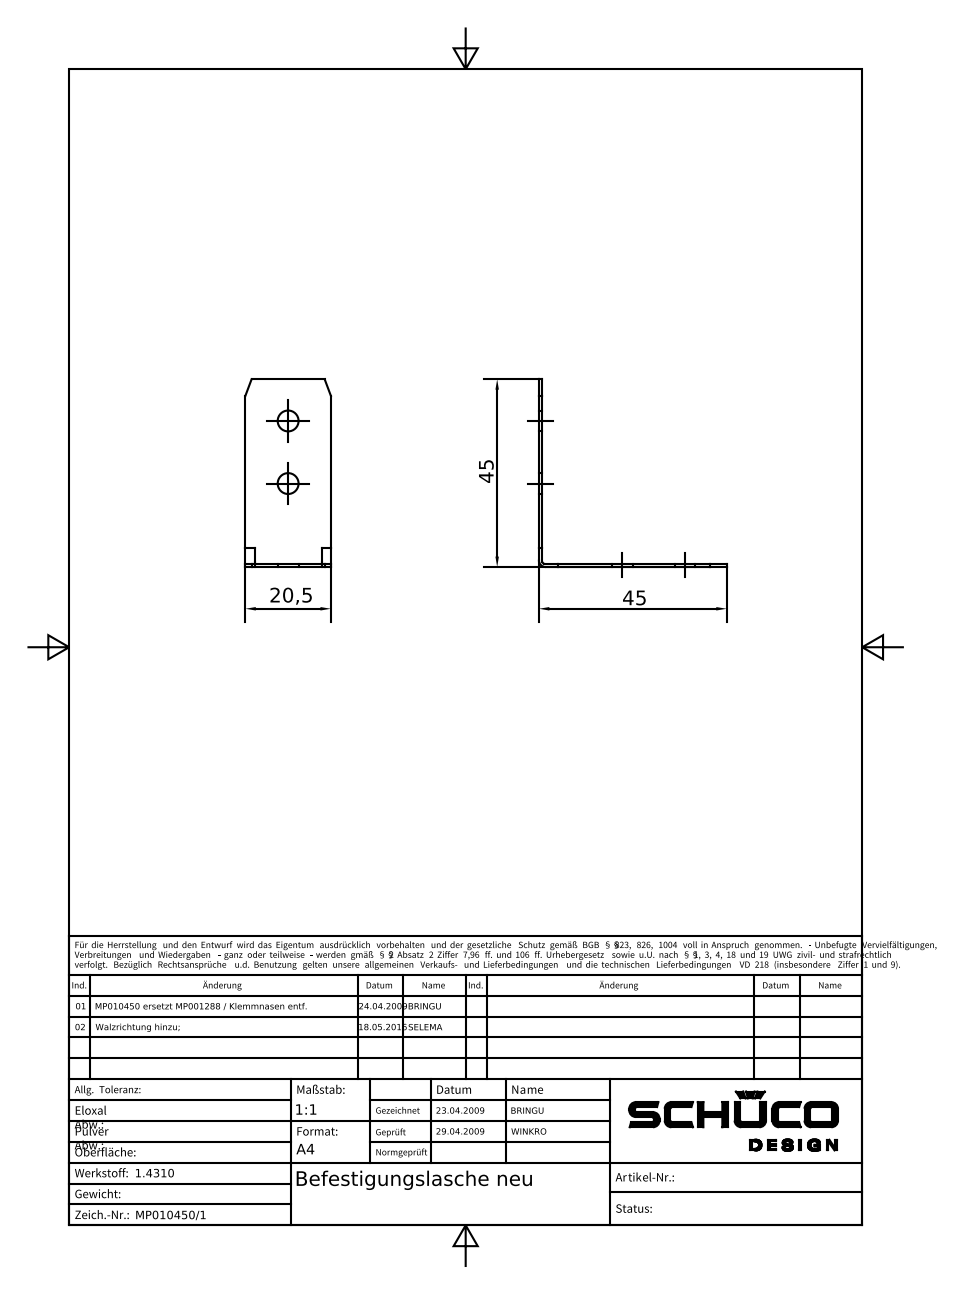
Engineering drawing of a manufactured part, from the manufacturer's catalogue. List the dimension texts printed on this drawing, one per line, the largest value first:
45
45
20,5
